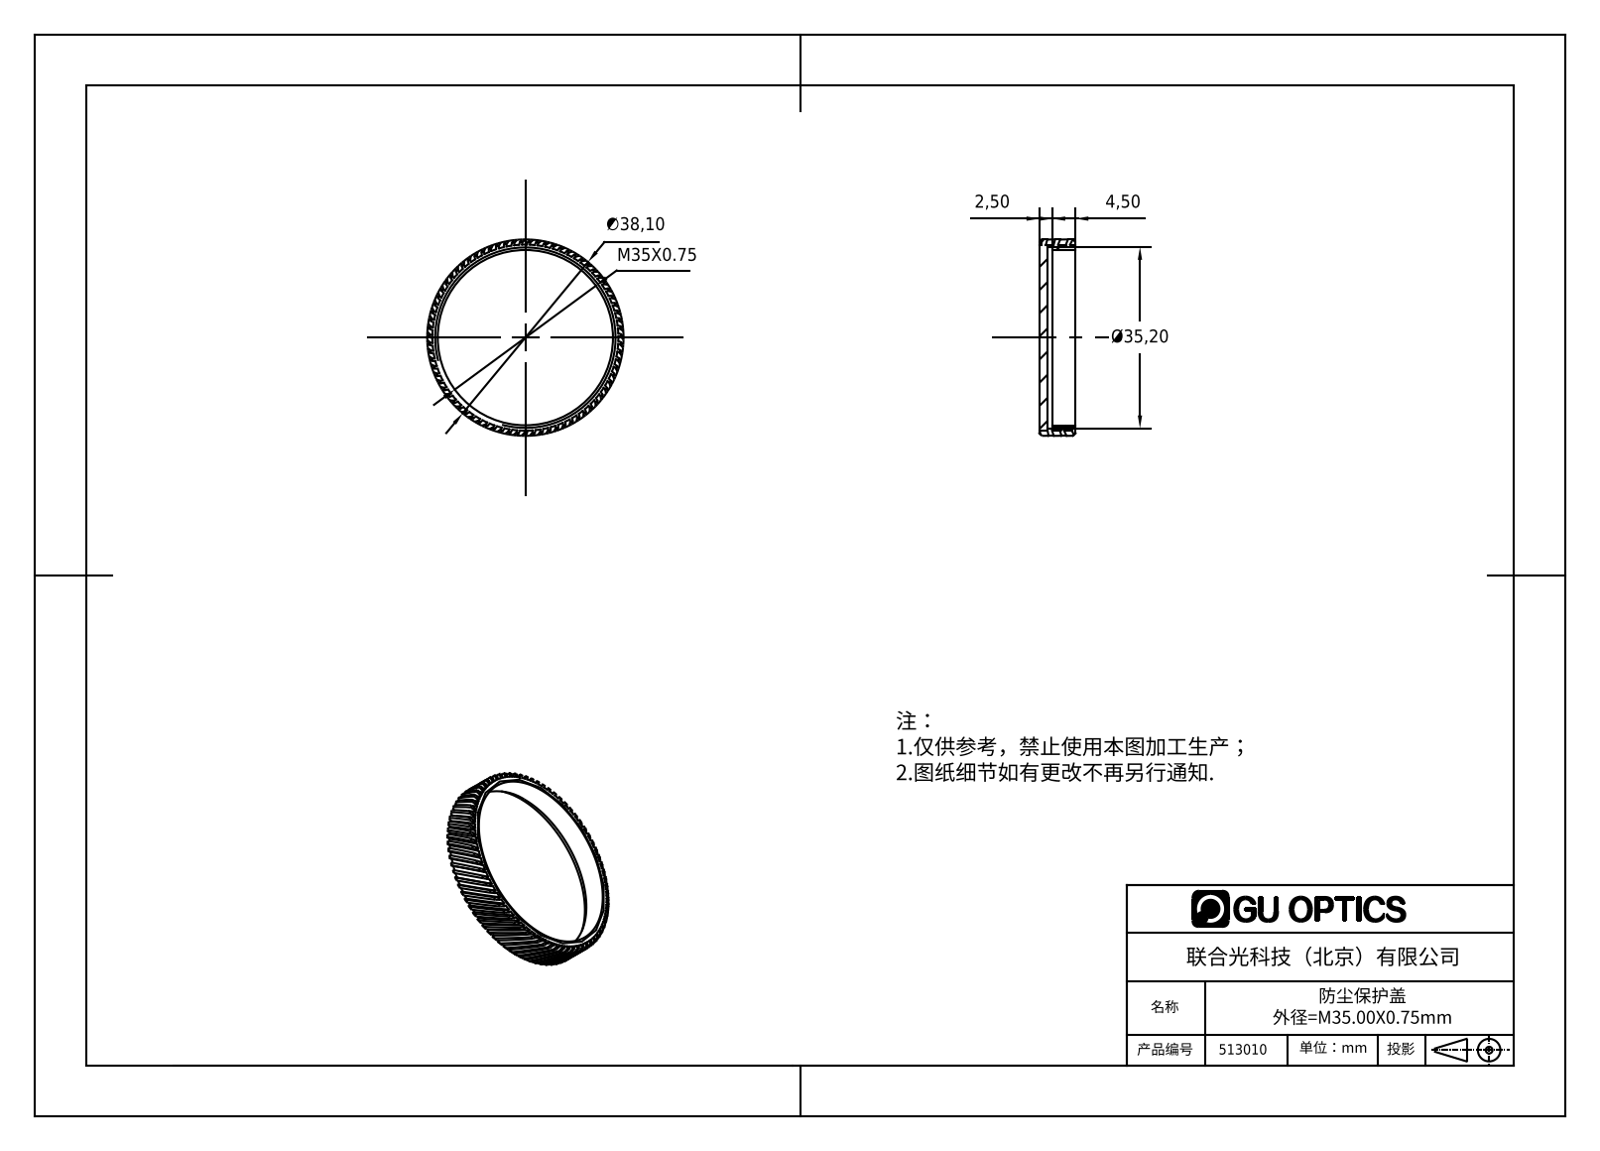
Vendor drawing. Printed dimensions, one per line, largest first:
∅38,10
Ø35,20
M35X0.75
4,50
2,50
